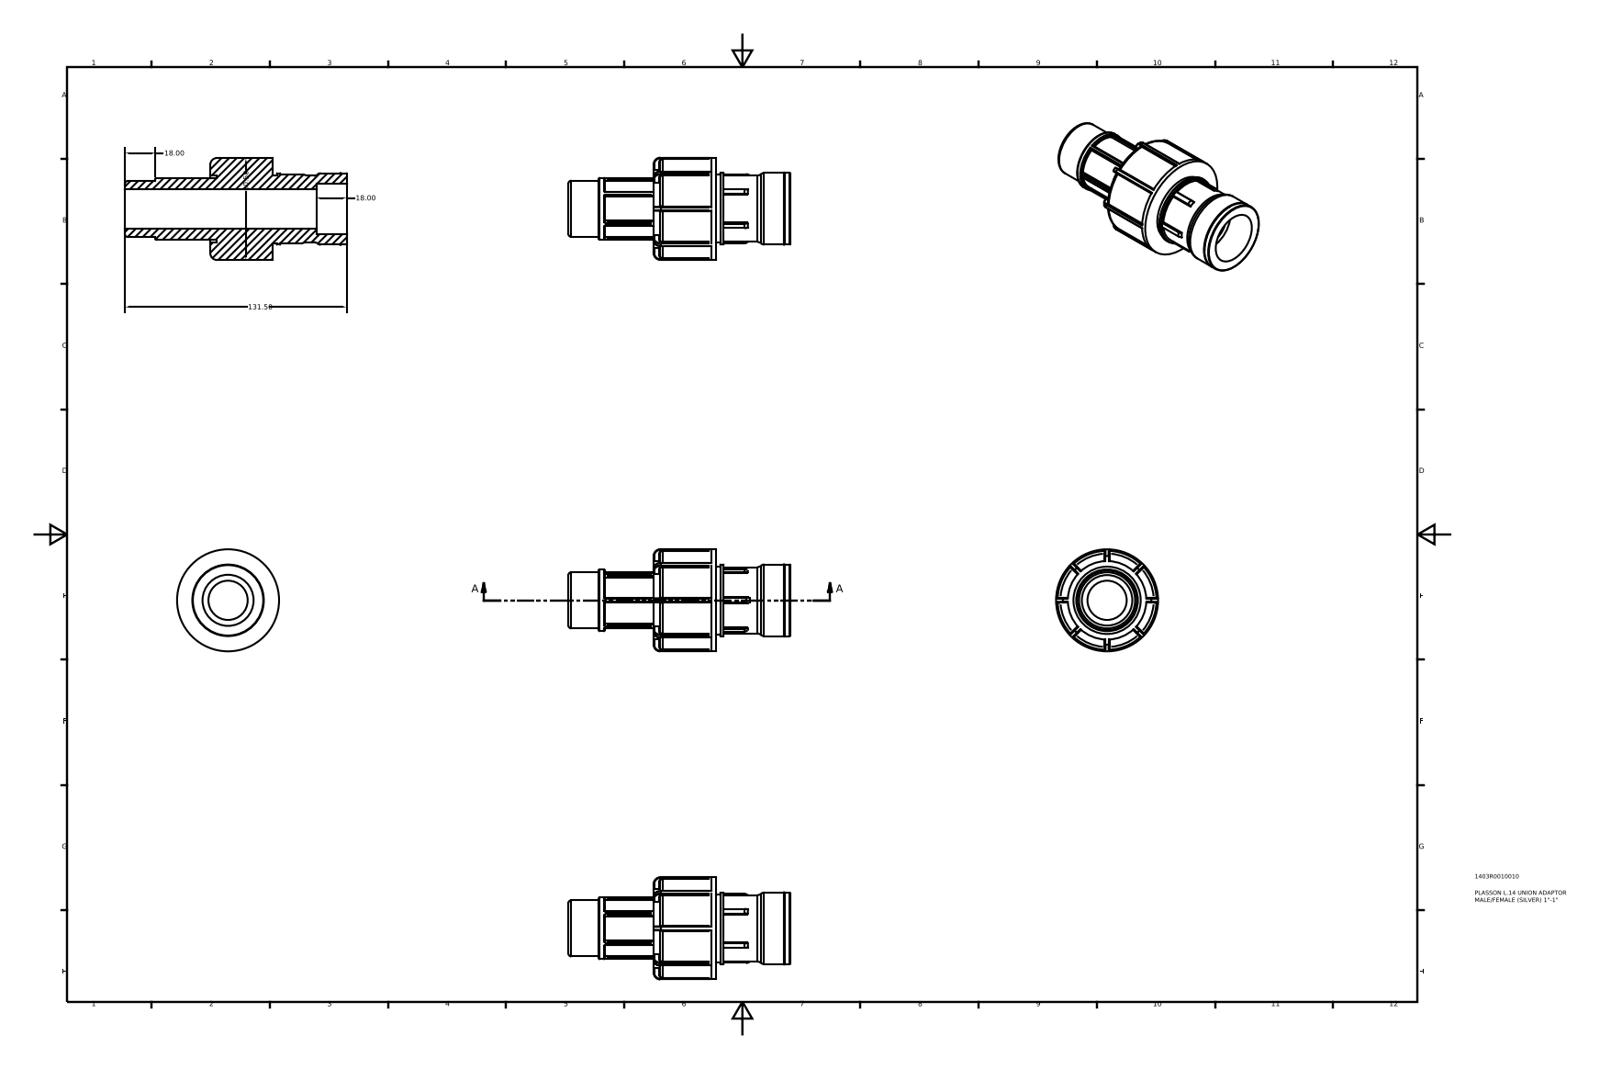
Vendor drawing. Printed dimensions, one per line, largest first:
131.50
60.50
18.00
18.00
